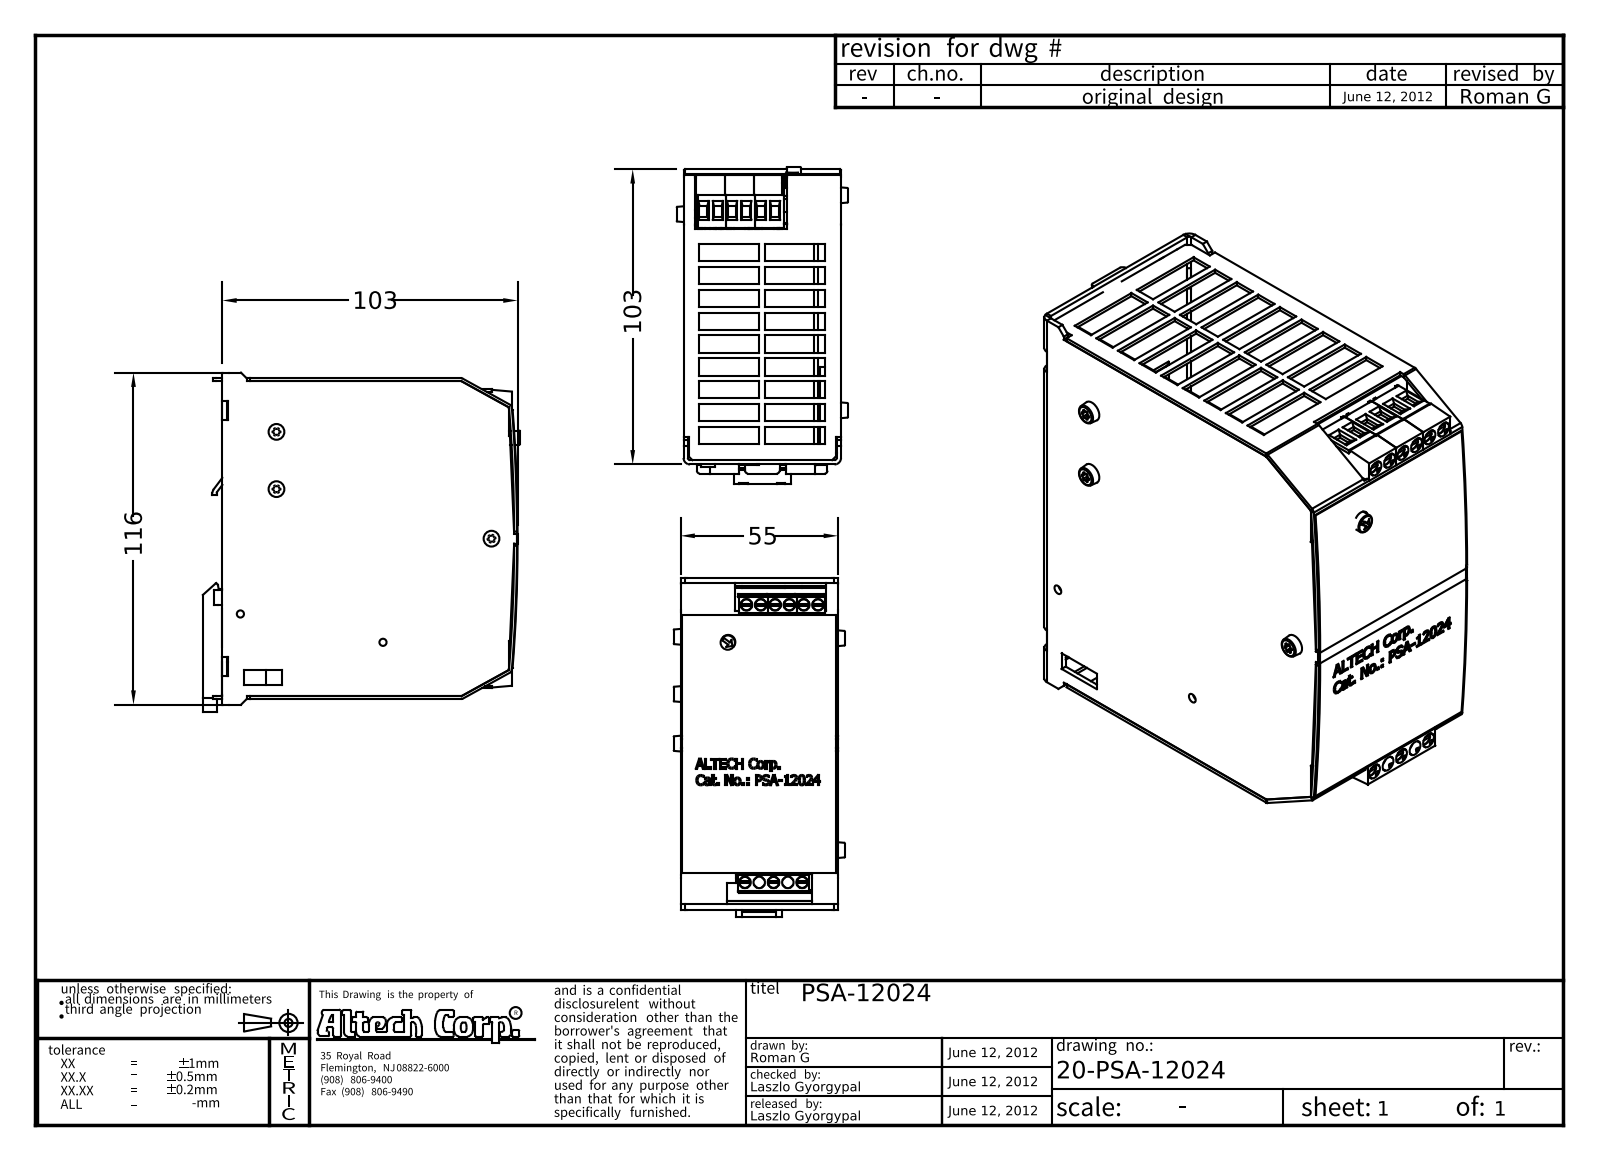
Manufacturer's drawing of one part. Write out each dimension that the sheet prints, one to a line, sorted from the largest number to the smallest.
116
103
103
55
